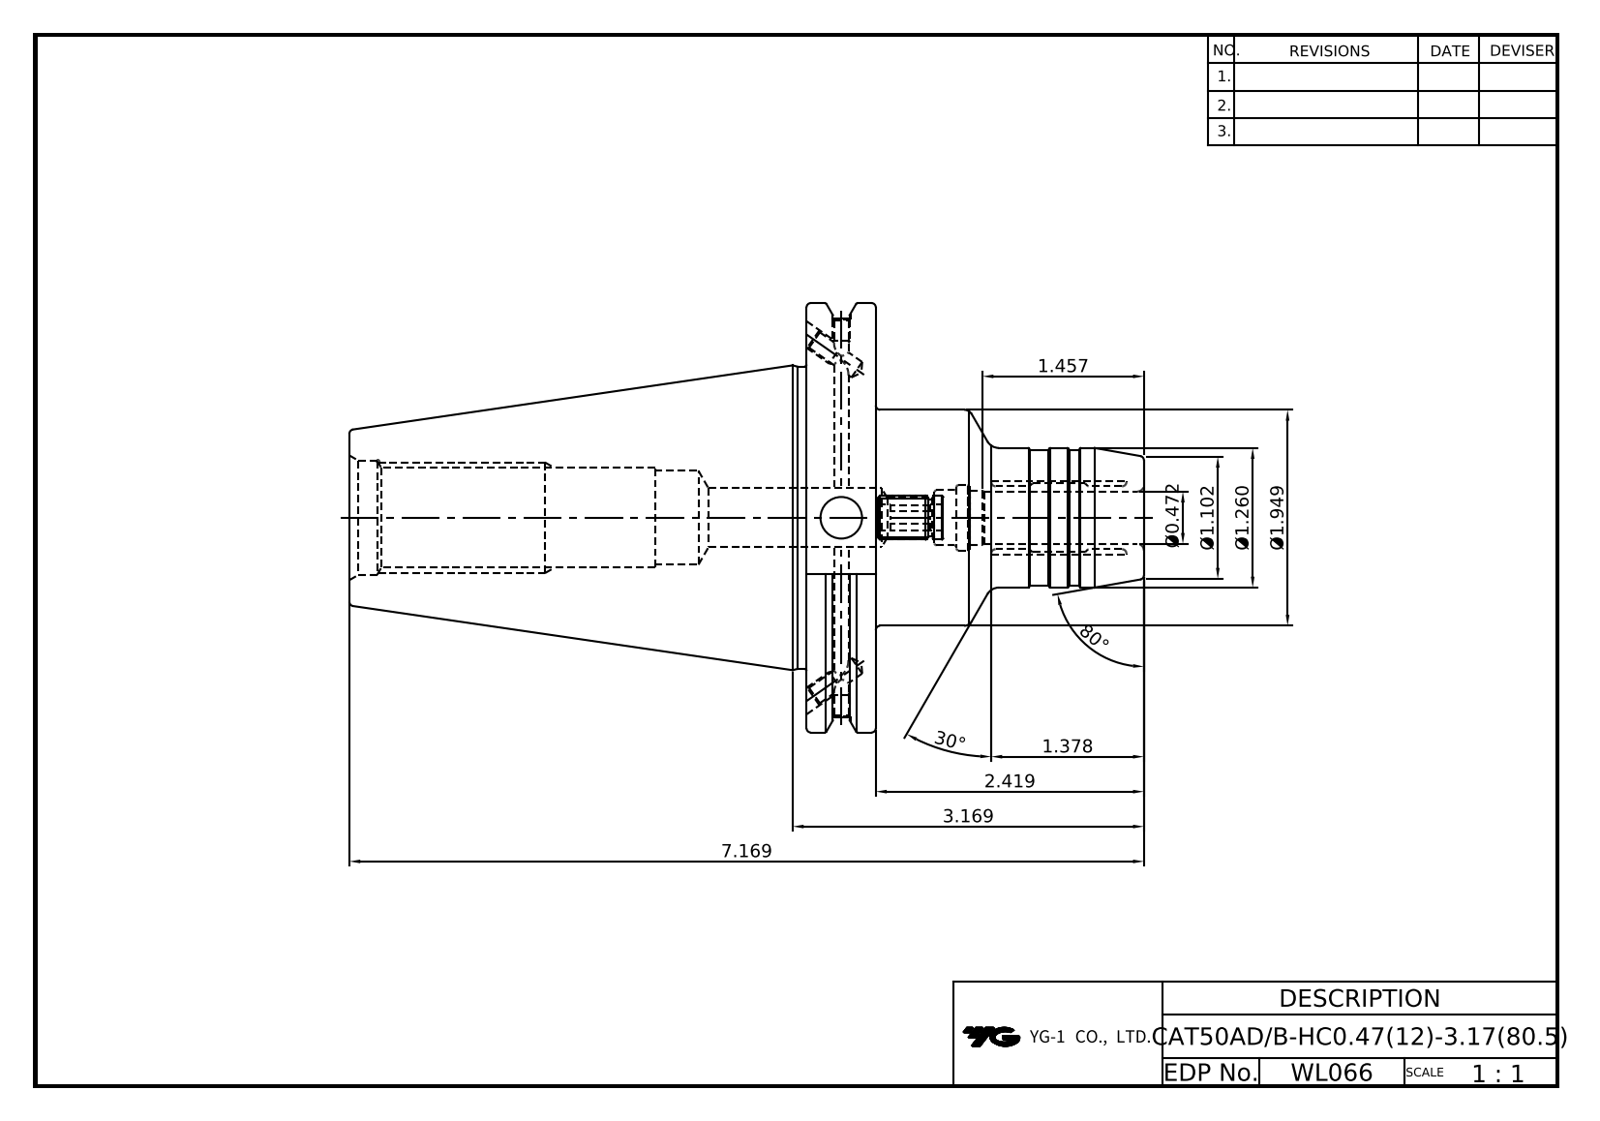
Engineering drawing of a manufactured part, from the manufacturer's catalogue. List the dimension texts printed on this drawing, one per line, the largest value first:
80°
30°
7.169
3.169
2.419
Ø1.949
1.457
1.378
Ø1.260
Ø1.102
Ø0.472
